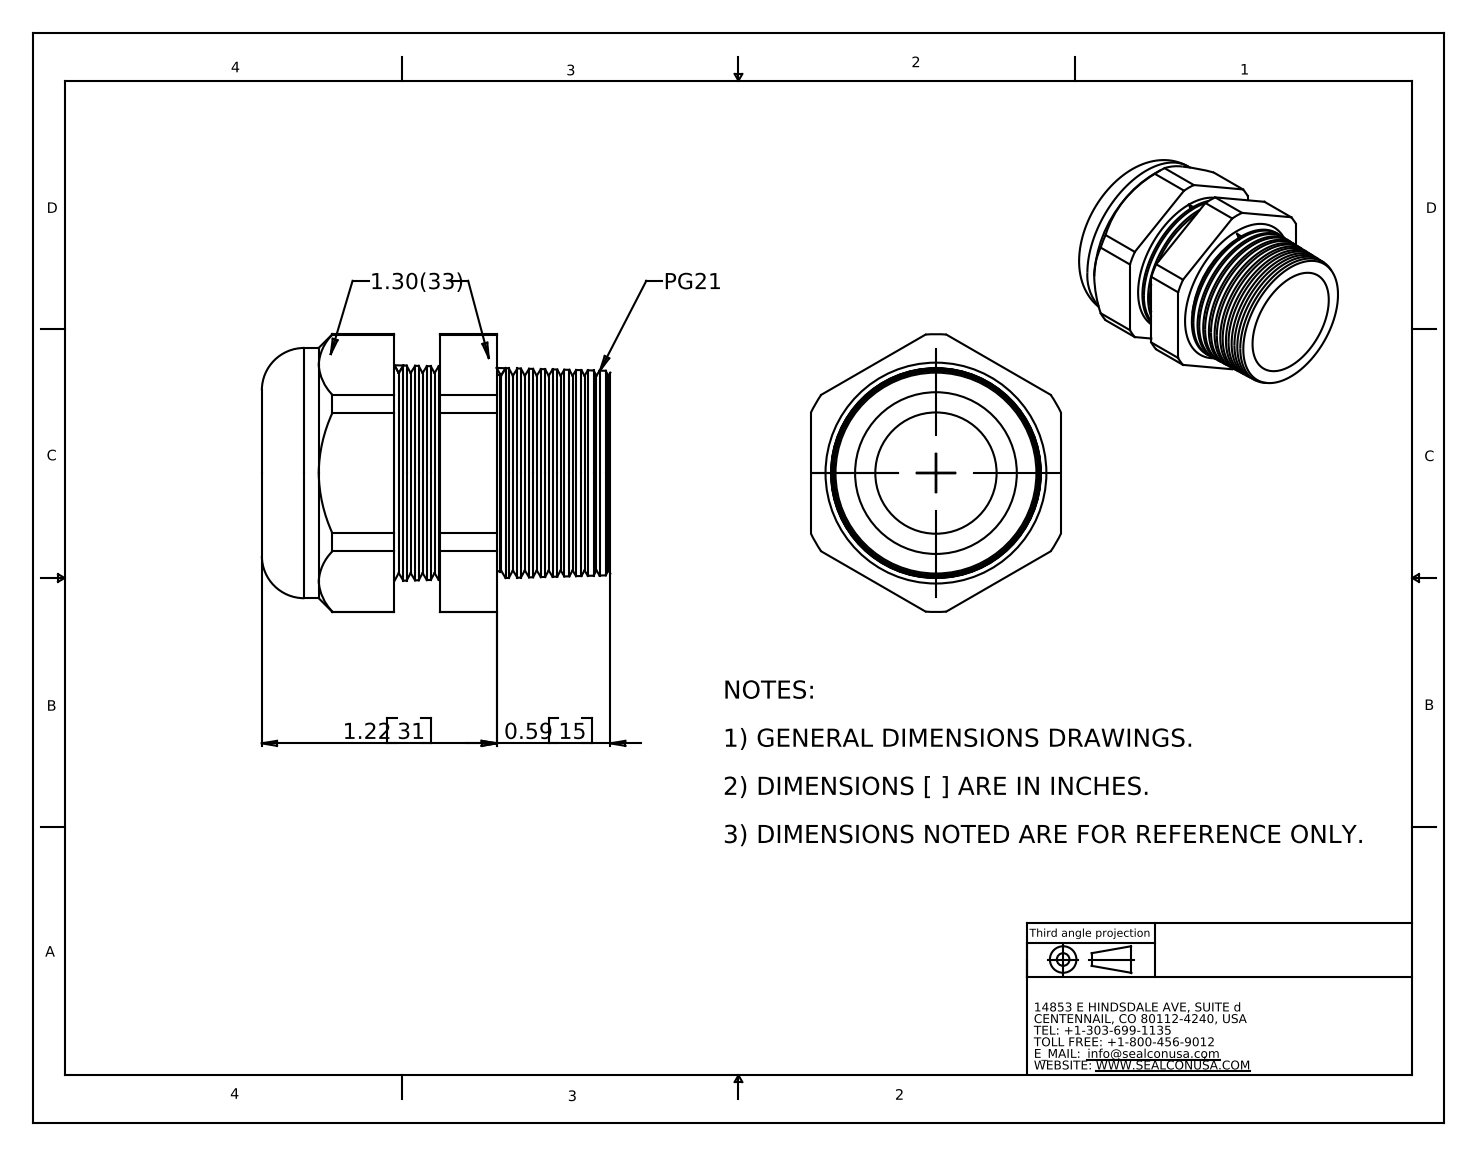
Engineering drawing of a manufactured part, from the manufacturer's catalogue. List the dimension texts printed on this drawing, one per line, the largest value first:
1.22 31
0.59 15
